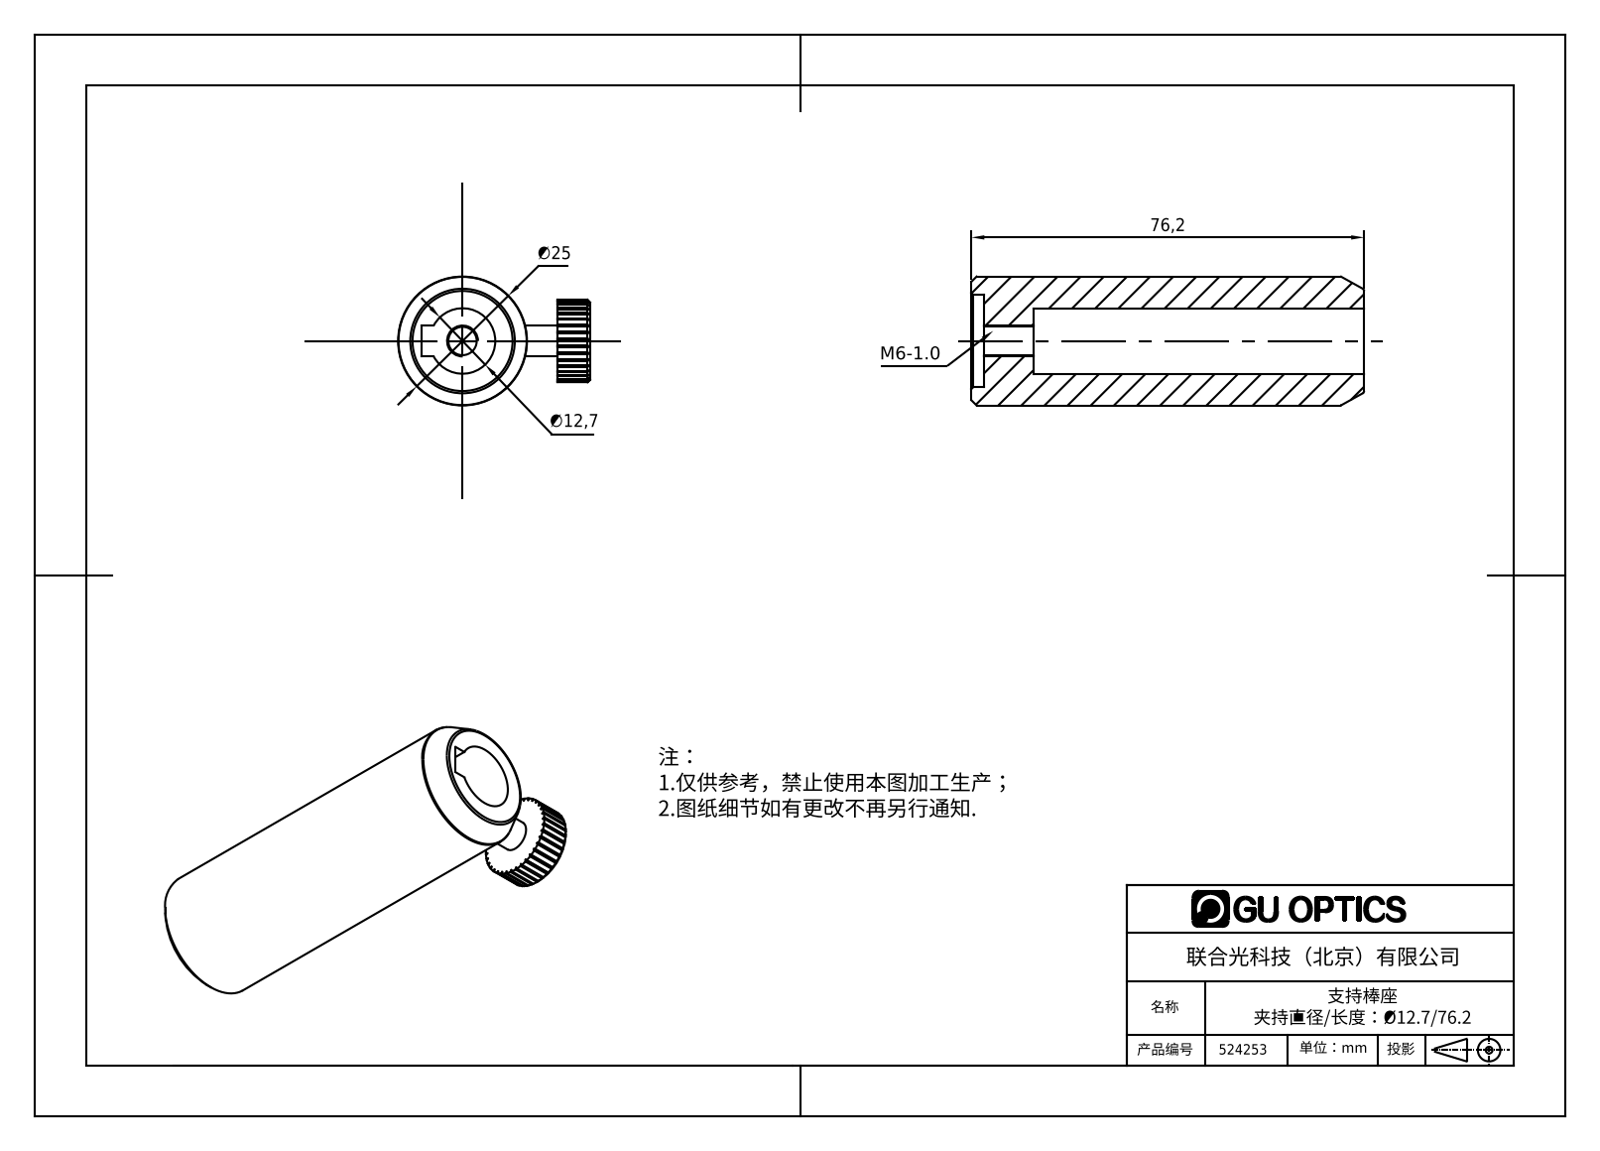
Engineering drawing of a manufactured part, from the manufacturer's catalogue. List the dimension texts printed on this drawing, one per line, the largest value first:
76,2
∅25
∅12,7
